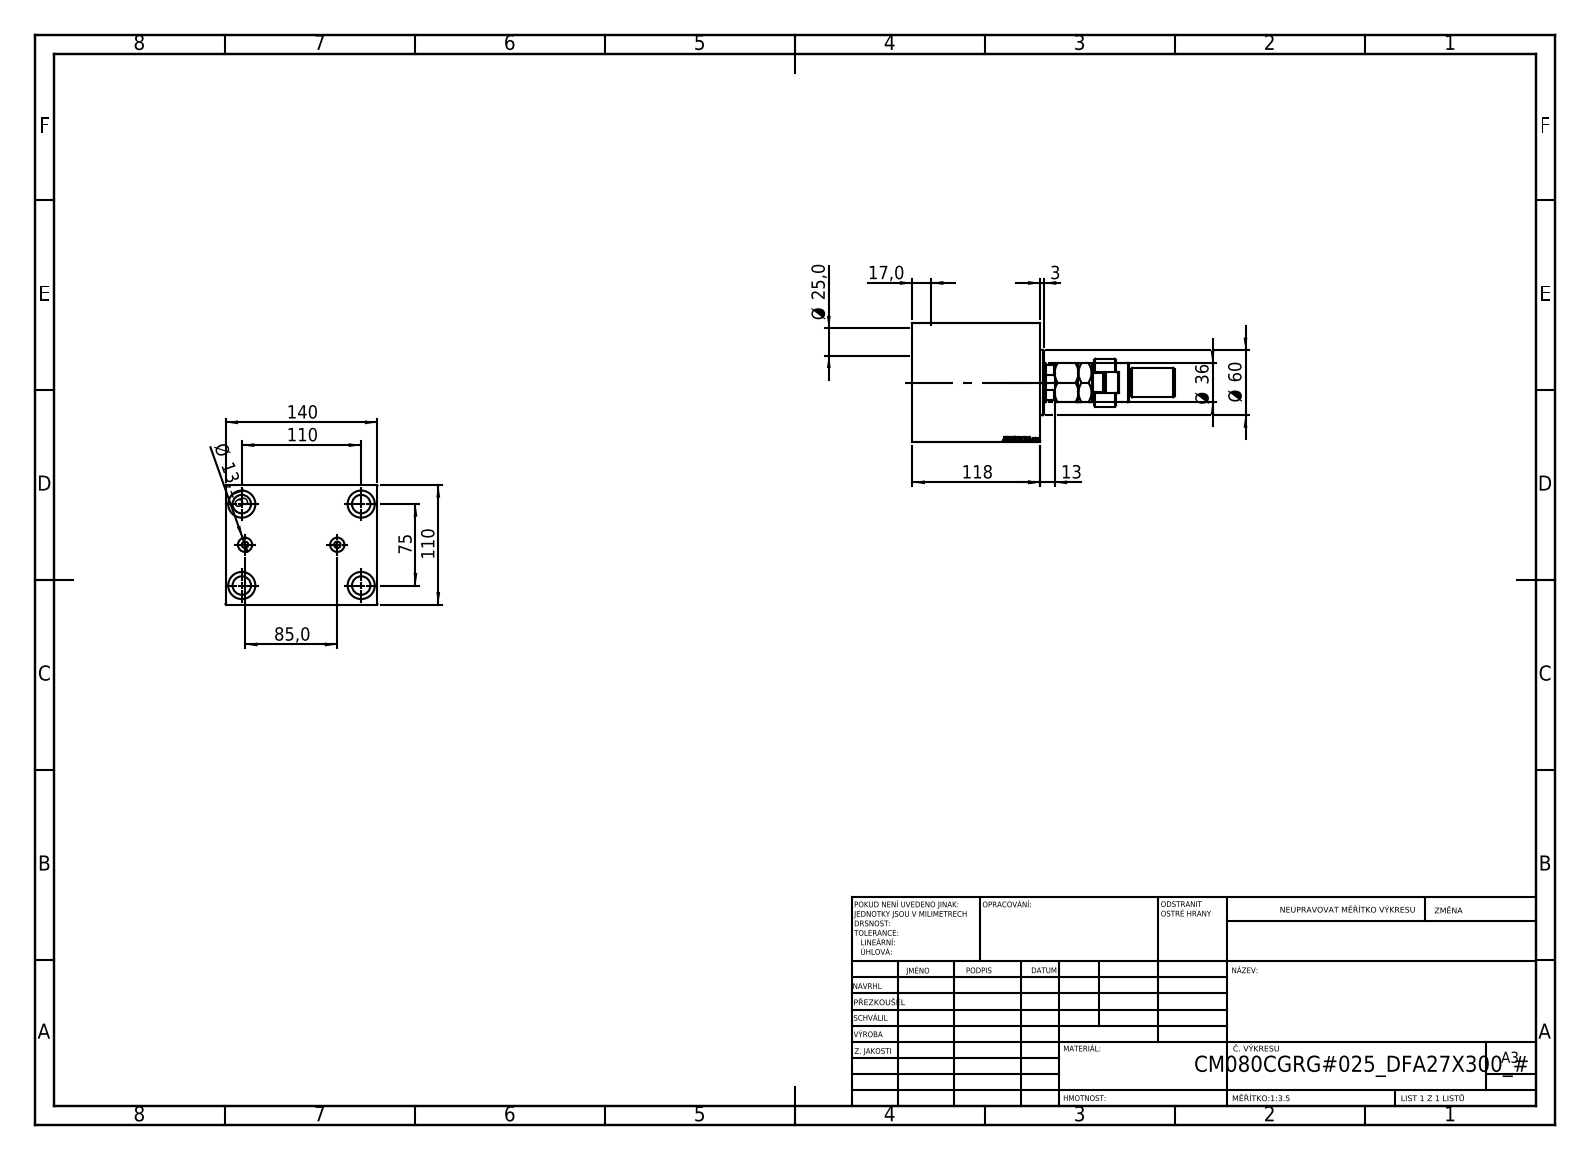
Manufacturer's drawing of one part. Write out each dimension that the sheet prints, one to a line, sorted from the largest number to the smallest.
140
118
110
110
85,0
75
Ø 60
Ø 36
Ø 25,0
17,0
Ø 13,16
13
3
